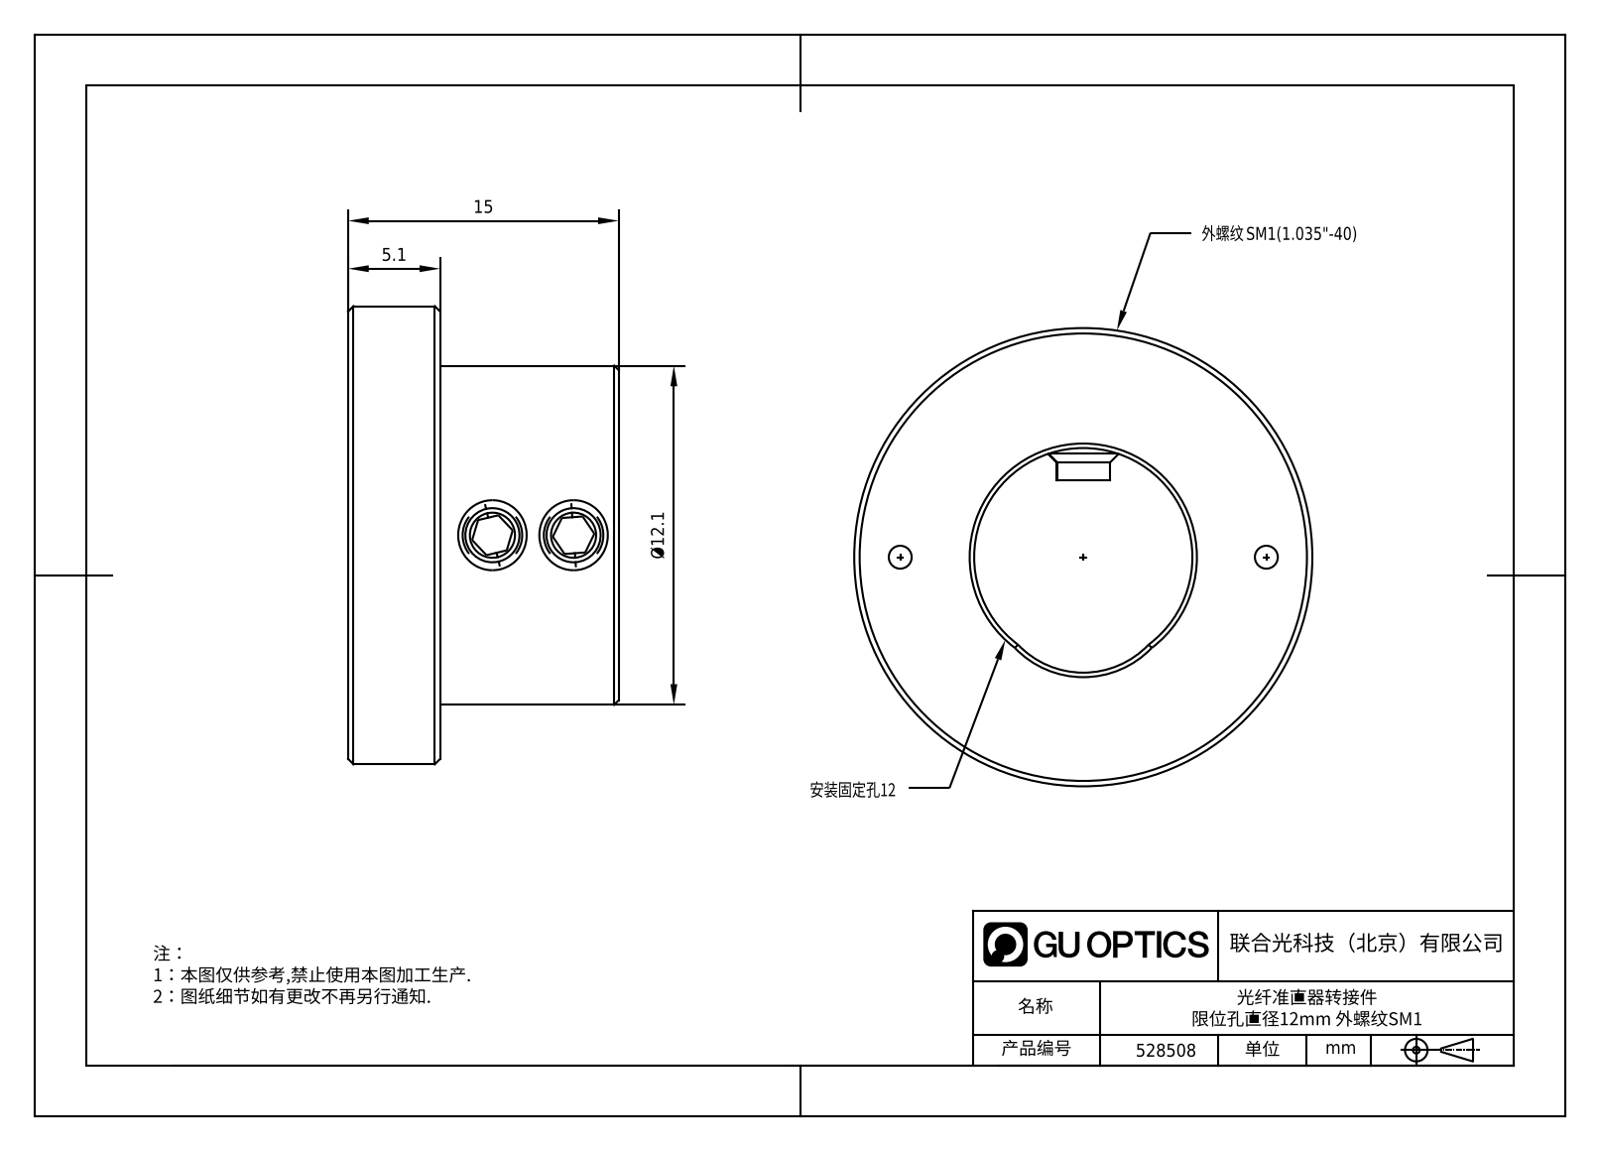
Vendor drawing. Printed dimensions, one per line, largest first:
15
Ø12.1
5.1
